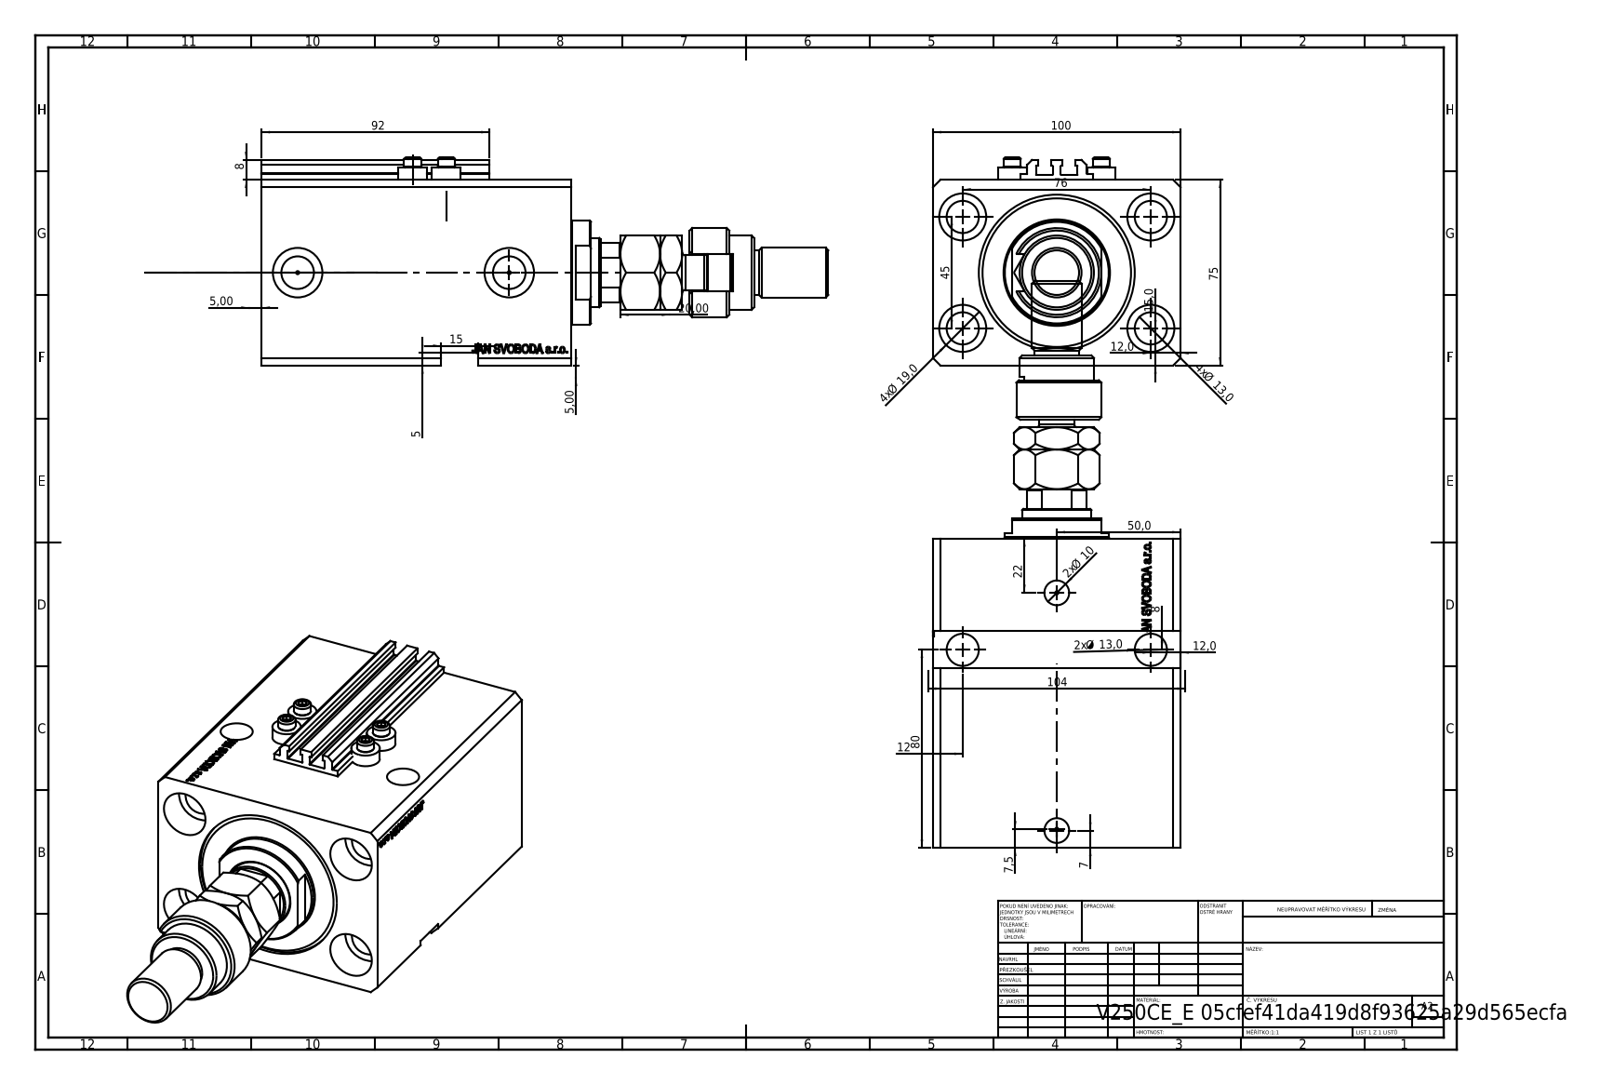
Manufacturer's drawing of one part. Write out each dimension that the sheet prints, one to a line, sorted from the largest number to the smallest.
104
100
92
80
76
75
50,0
45
22
20,00
4x Ø 19,0
15,0
15
4x Ø 13,0
2x Ø 13,0
12,0
12,0
12
2x Ø 10
8
8
7,5
7
5,00
5,00
5
